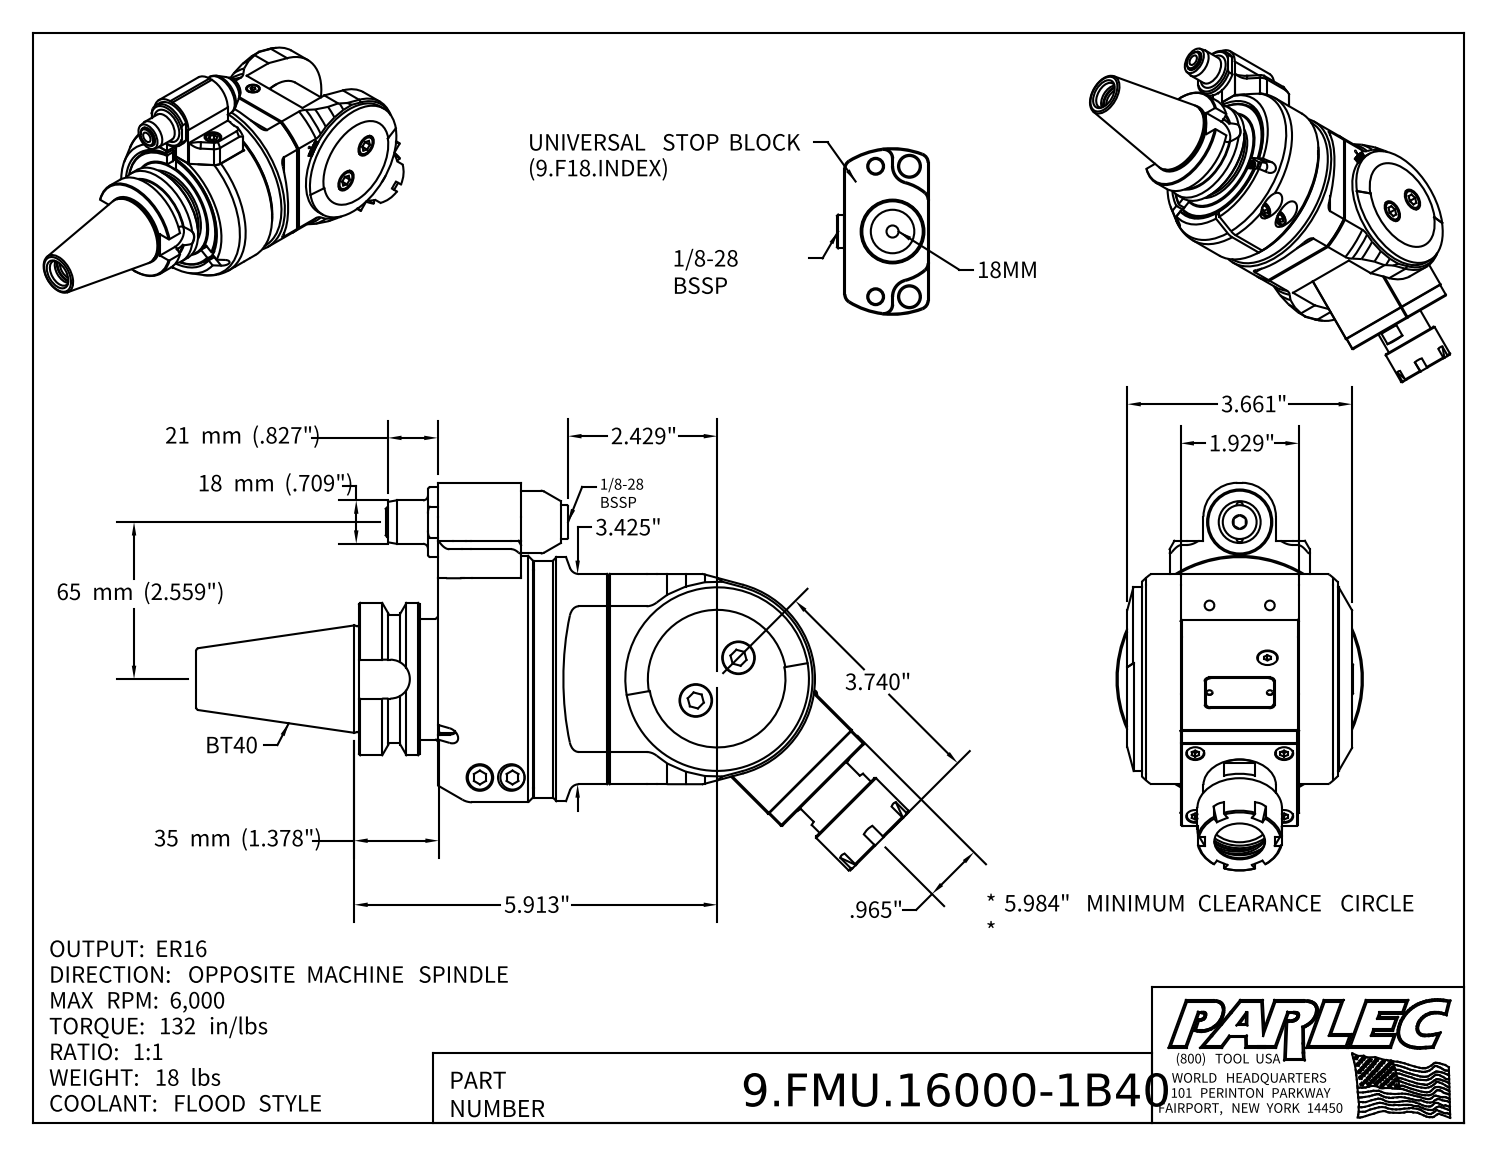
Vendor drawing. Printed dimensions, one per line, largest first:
65 mm (2.559")
35 mm (1.378")
21 mm (.827")
18 mm (.709")
5.913"
3.740"
3.661"
3.425"
2.429"
1.929"
.965"
